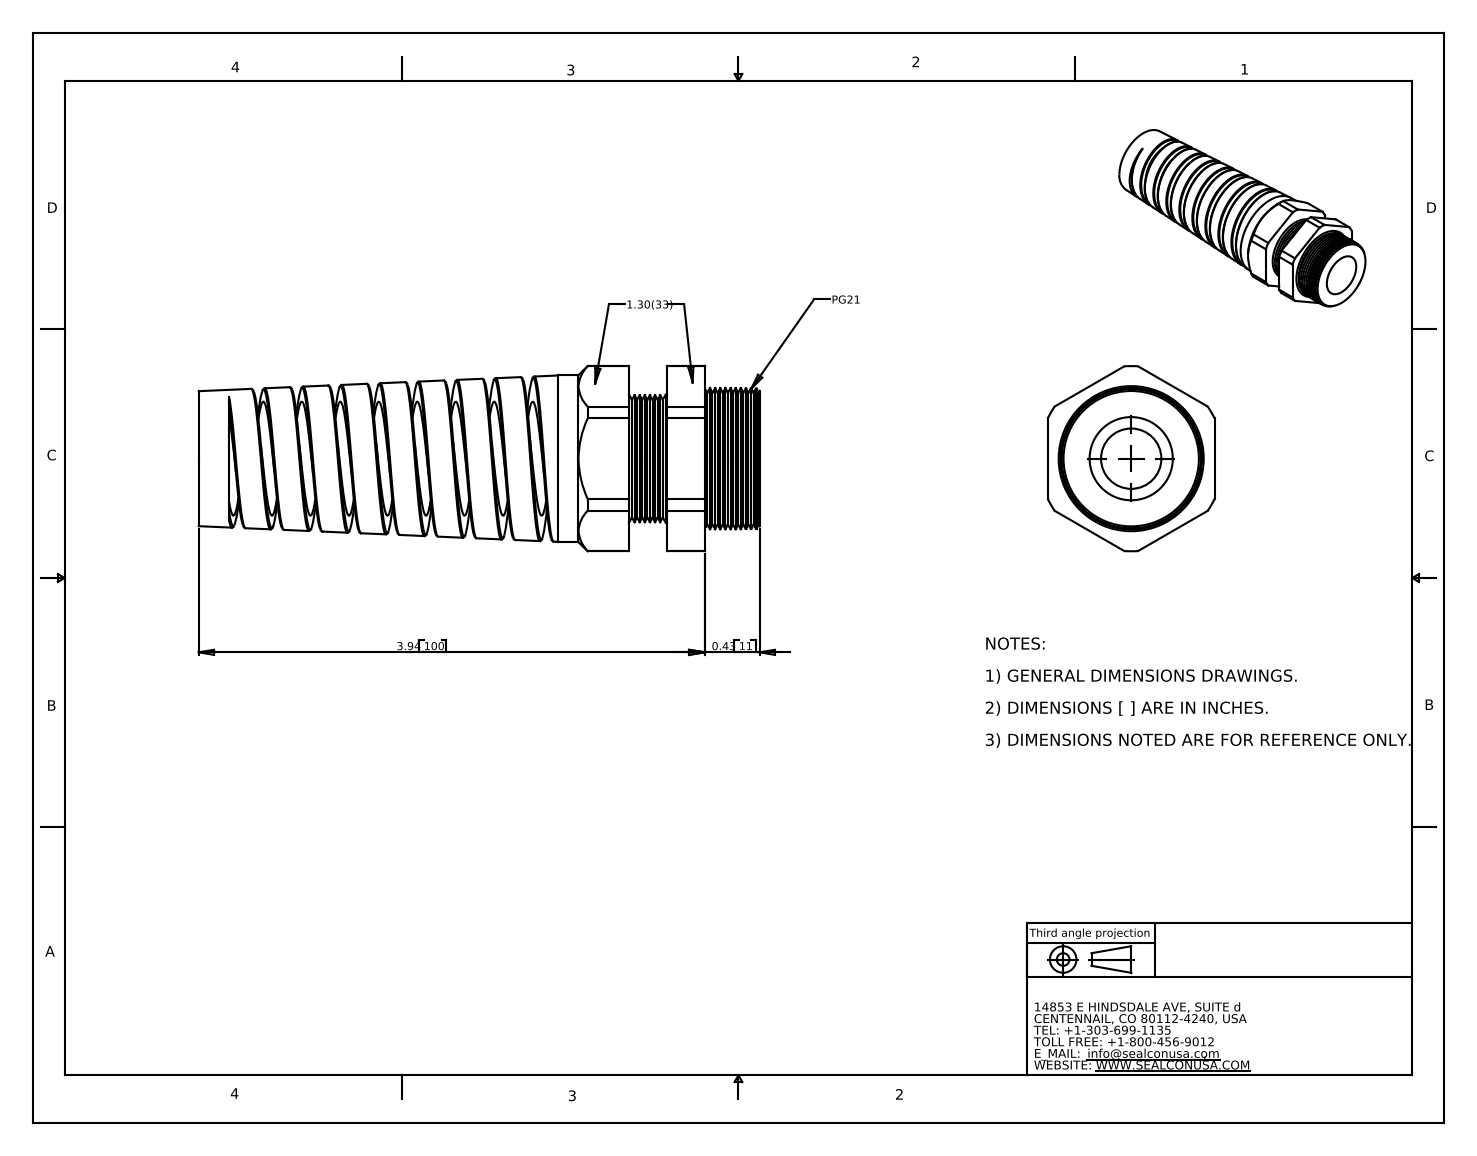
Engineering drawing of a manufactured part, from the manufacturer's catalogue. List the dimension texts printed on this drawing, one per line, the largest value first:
3.94 100
0.43 11
